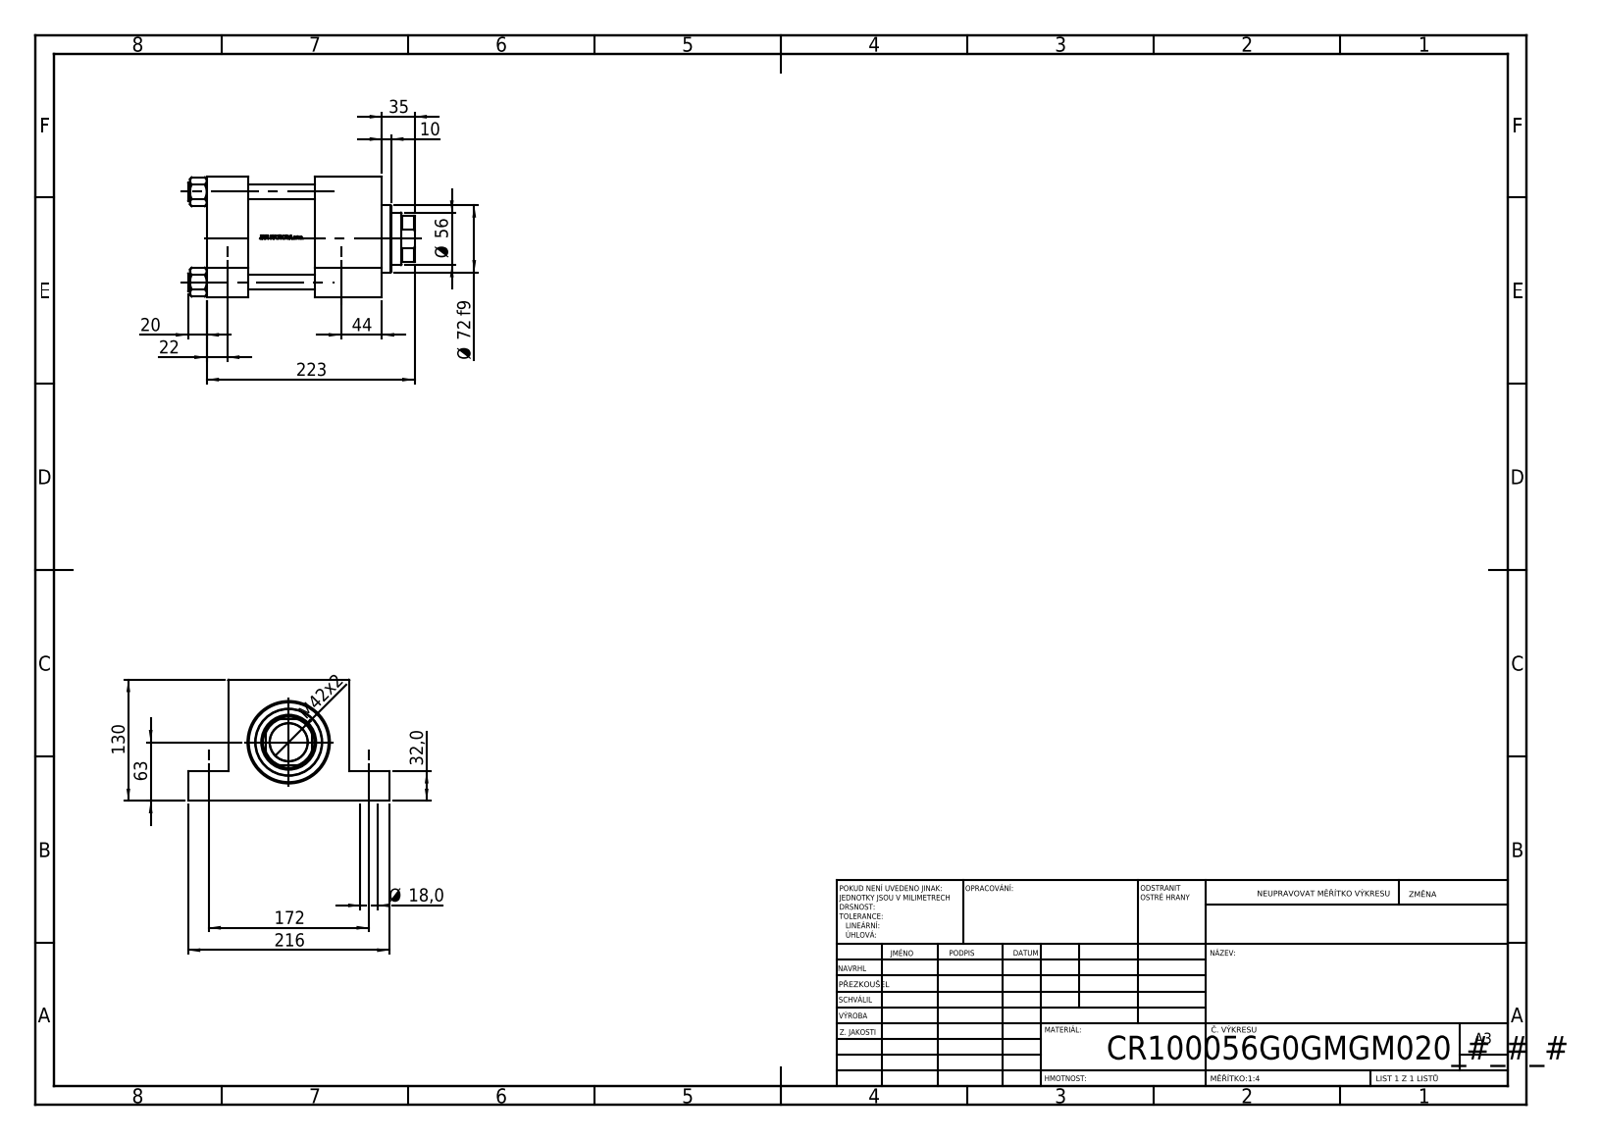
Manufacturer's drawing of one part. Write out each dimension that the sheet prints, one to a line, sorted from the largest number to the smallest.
223
216
172
130
Ø 72 f9
63
Ø 56
44
M42x2
35
32,0
22
20
Ø 18,0
10
